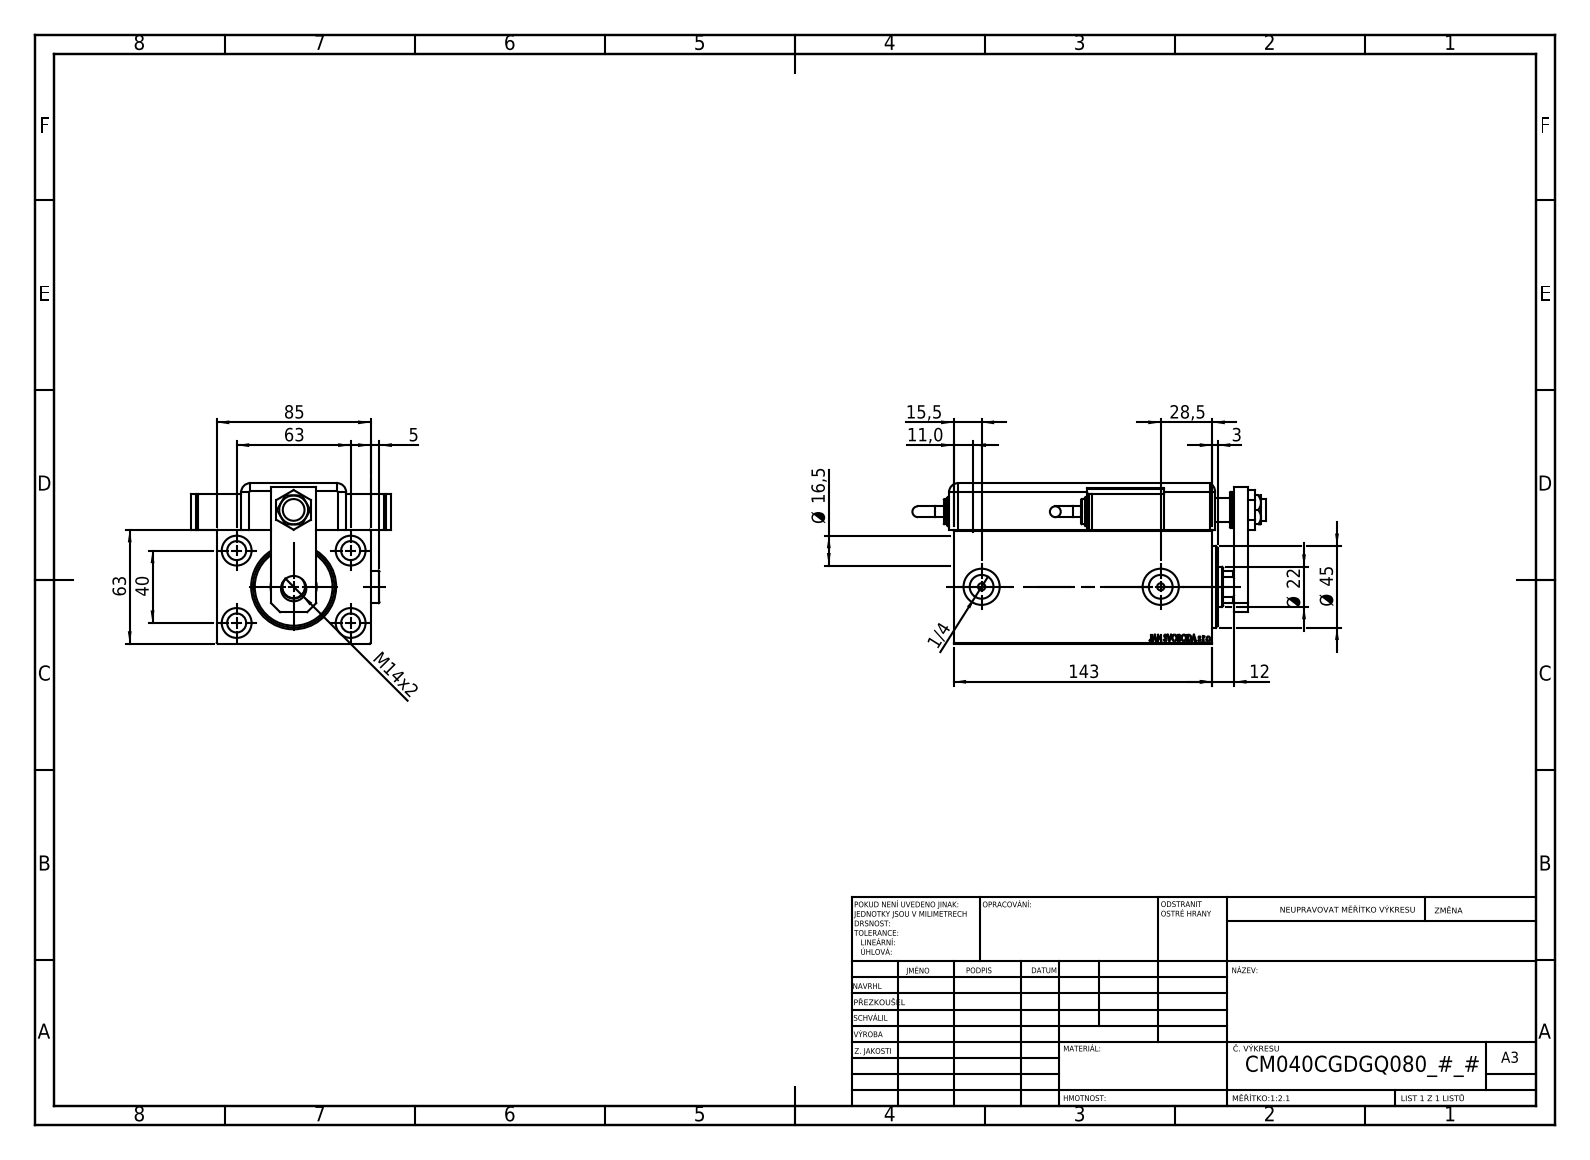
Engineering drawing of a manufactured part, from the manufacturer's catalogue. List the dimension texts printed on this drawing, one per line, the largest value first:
143
85
63
63
Ø 45
40
28,5
Ø 22
Ø 16,5
15,5
M14x2
12
11,0
5
3
1/4
